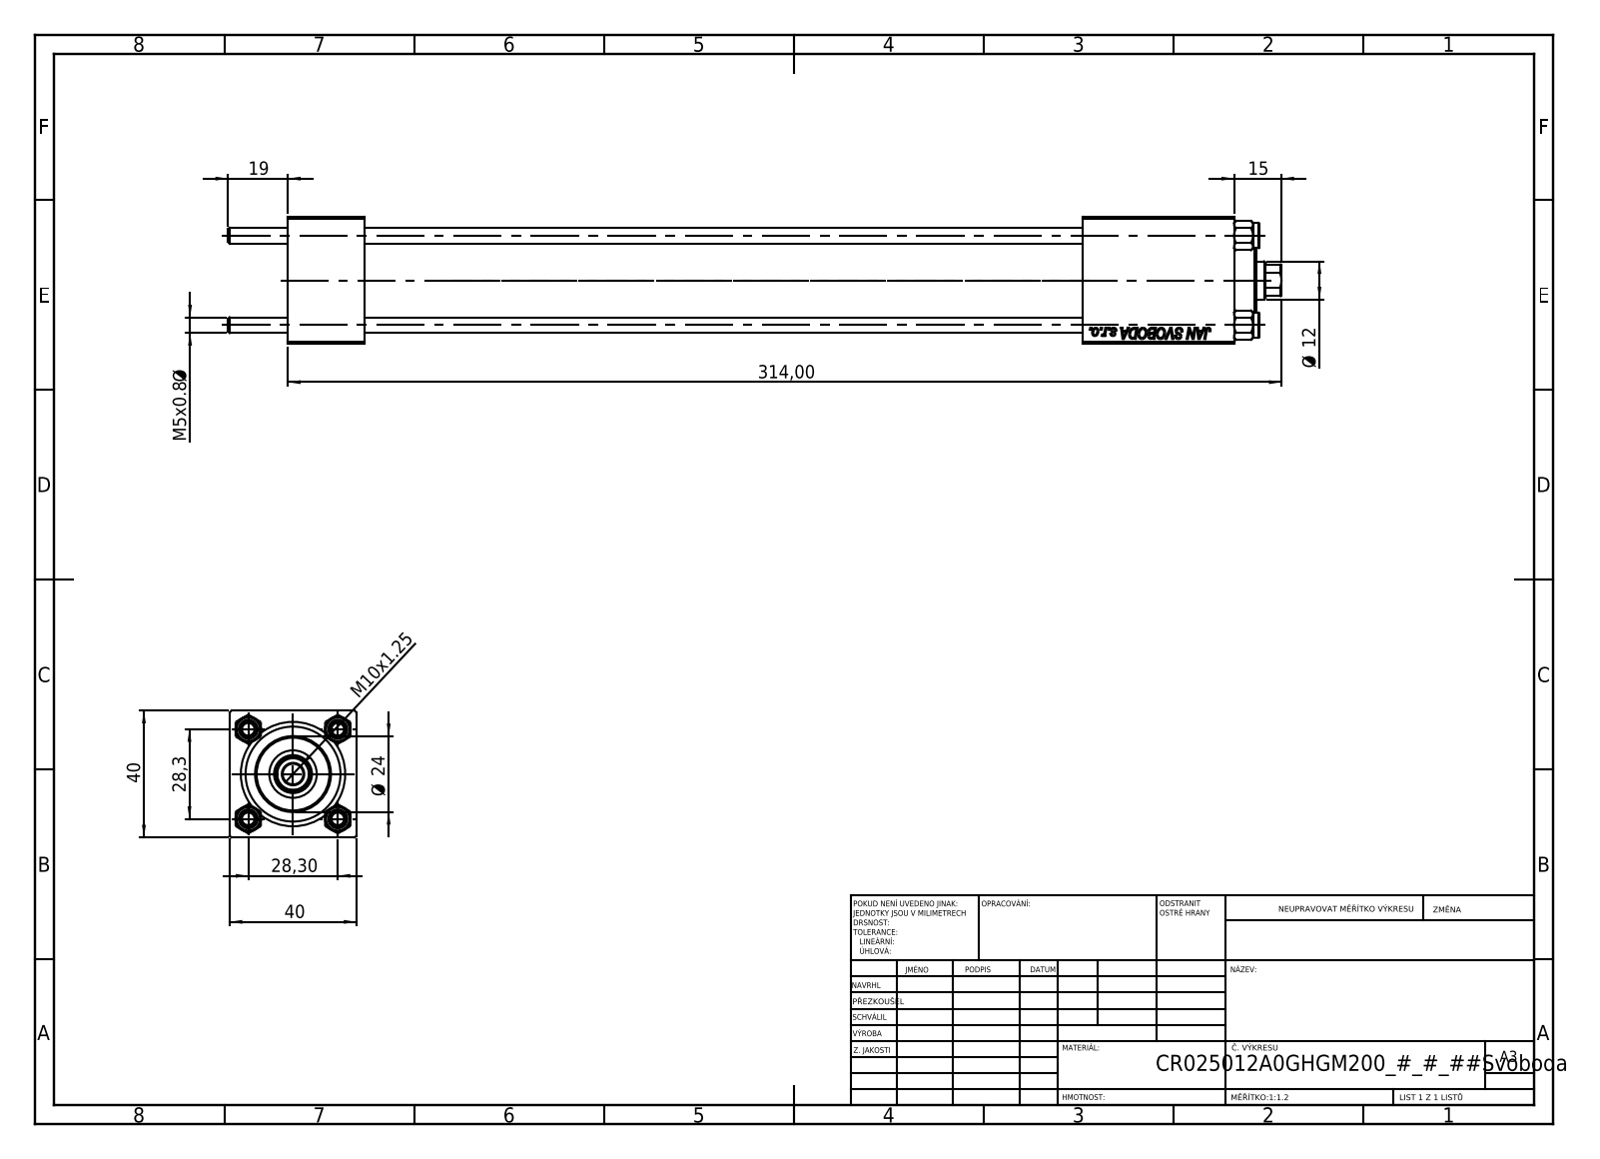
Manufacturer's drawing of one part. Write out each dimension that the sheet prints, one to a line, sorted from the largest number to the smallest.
314,00
40
40
28,3
28,30
Ø 24
19
15
Ø 12
M10x1.25
M5x0.8 Ø
